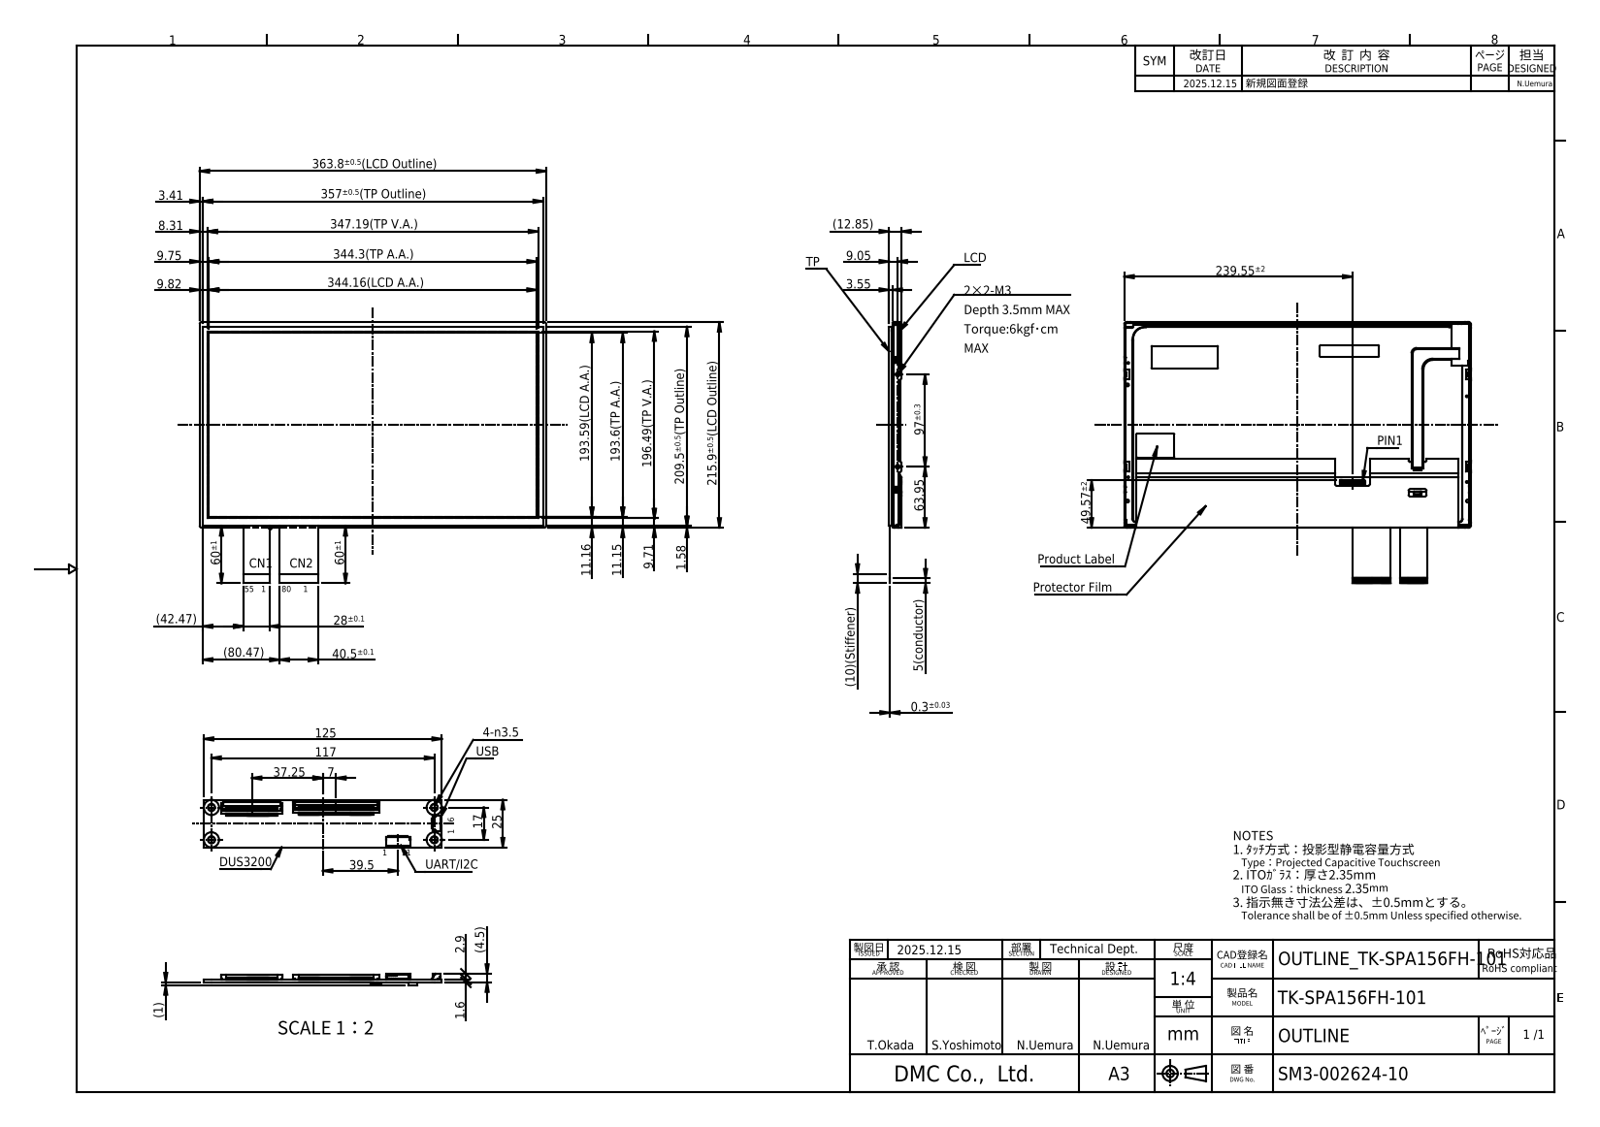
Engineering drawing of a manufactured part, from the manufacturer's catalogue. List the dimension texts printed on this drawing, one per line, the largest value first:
363.8±0.5(LCD Outline)
357±0.5(TP Outline)
347.19(TP V.A.)
344.3(TP A.A.)
344.16(LCD A.A.)
239.55±2
215.9±0.5(LCD Outline)
209.5±0.5(TP Outline)
196.49(TP V.A.)
193.6(TP A.A.)
193.59(LCD A.A.)
125
117
97±0.3
(80.47)
63.95
60±1
60±1
49.57±2
(42.47)
40.5±0.1
39.5
37.25
28±0.1
25
17
(12.85)
11.16
11.15
(10)(Stiffener)
9.82
9.75
9.71
9.05
8.31
7
5(conductor)
(4.5)
3.55
3.41
2.9
1.6
1.58
(1)
0.3±0.03
